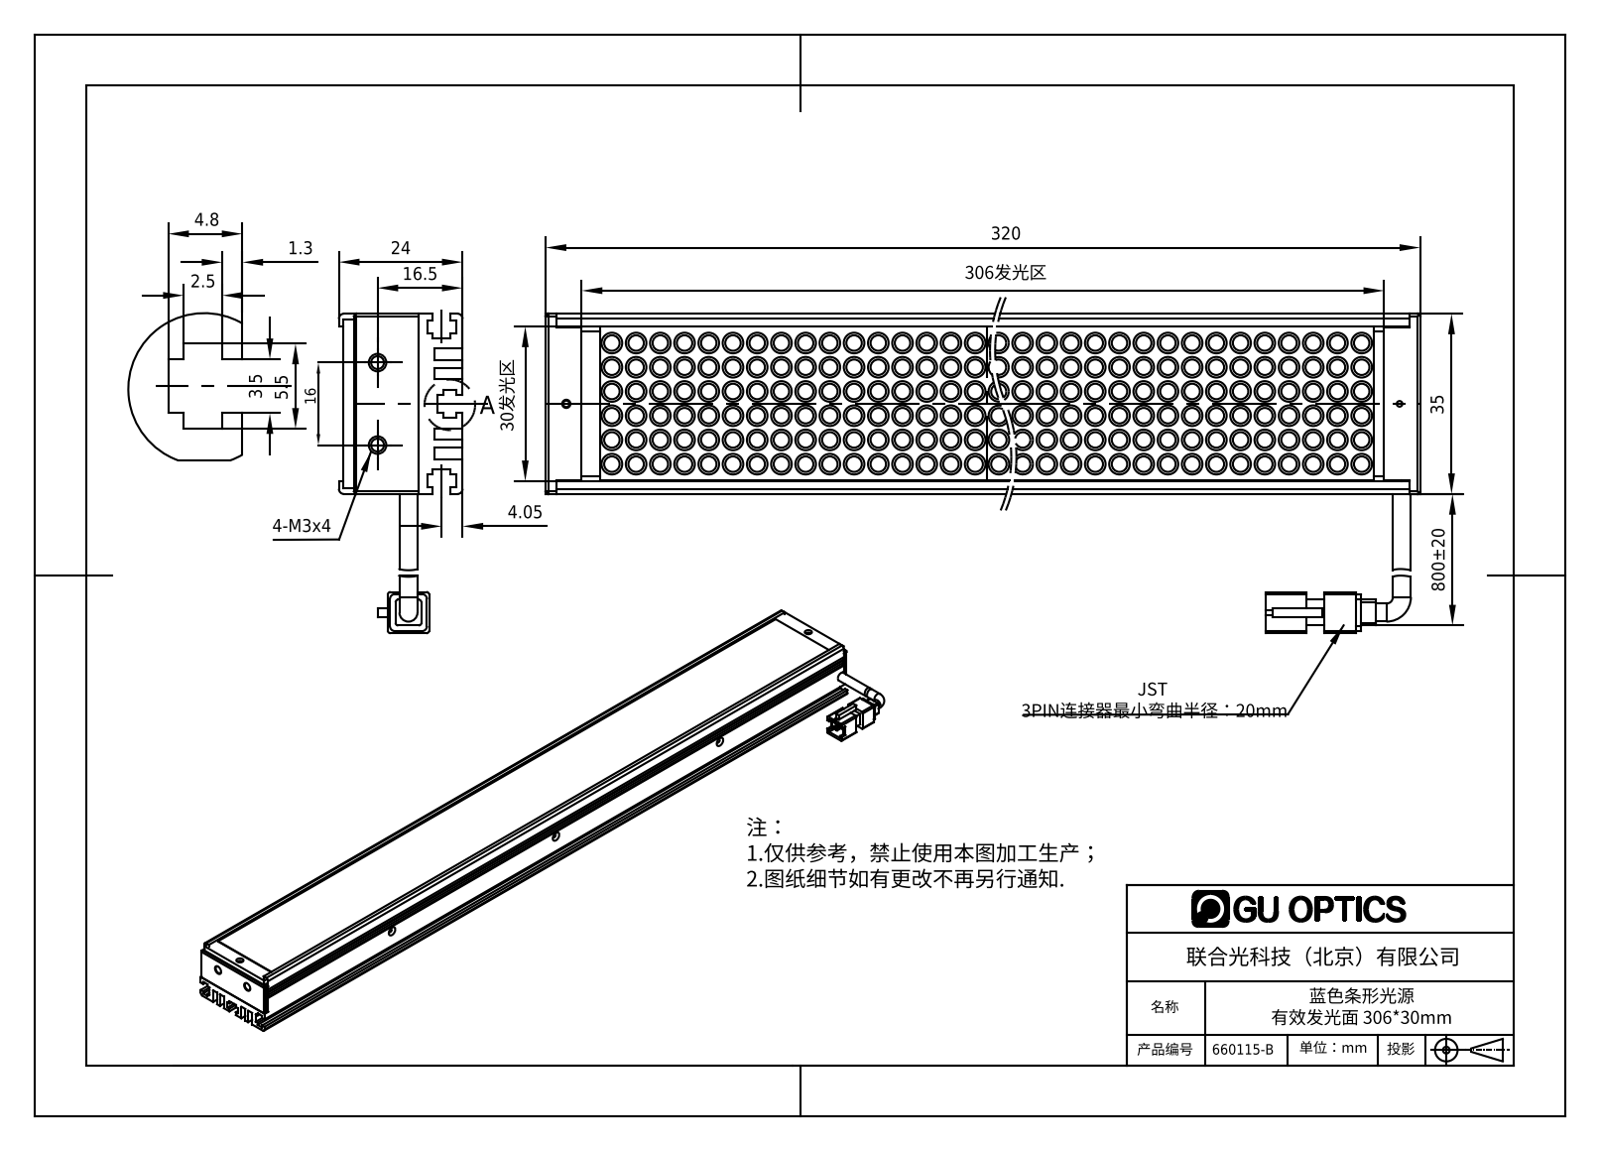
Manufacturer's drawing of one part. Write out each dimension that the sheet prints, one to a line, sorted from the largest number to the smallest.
800±20
320
306发光区
35
30发光区
24
16.5
16
5.5
4.8
4.05
3.5
2.5
1.3
